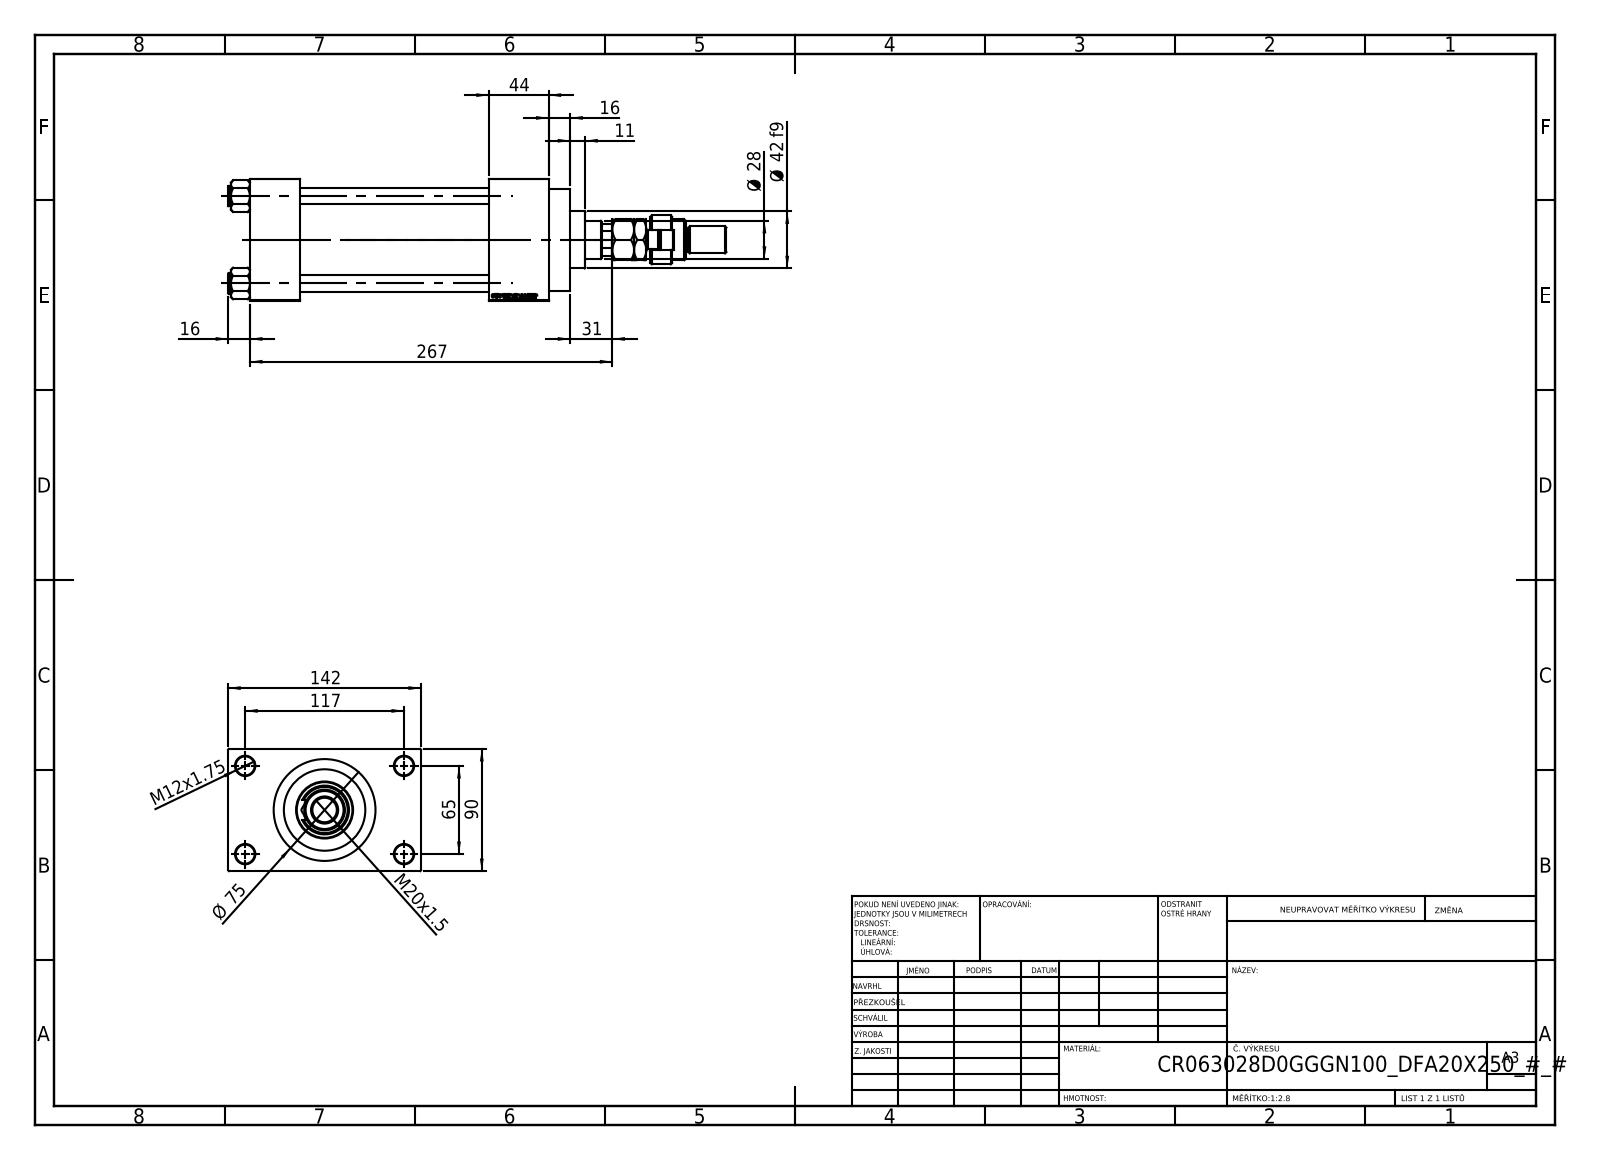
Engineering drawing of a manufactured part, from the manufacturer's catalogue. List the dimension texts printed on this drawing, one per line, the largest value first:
267
142
117
90
Ø 75
65
44
Ø 42 f9
31
Ø 28
M20x1.5
16
16
M12x1.75
11
